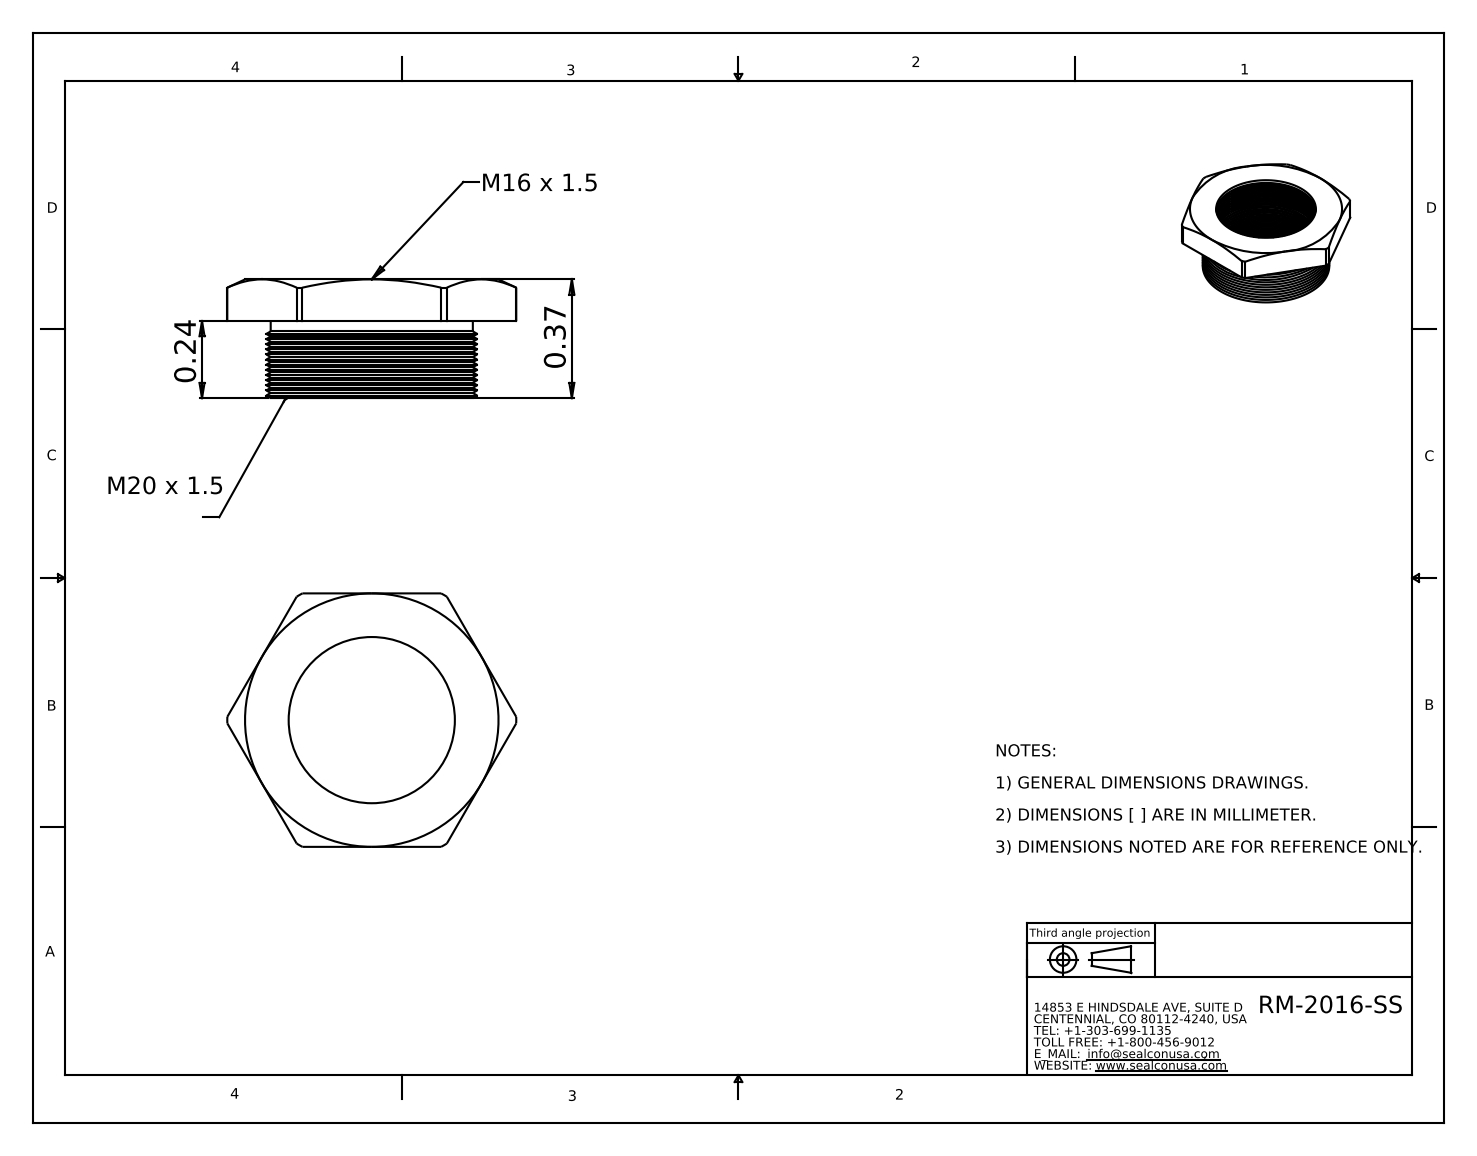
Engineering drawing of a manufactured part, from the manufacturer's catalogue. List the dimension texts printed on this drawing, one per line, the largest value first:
0.37
0.24
